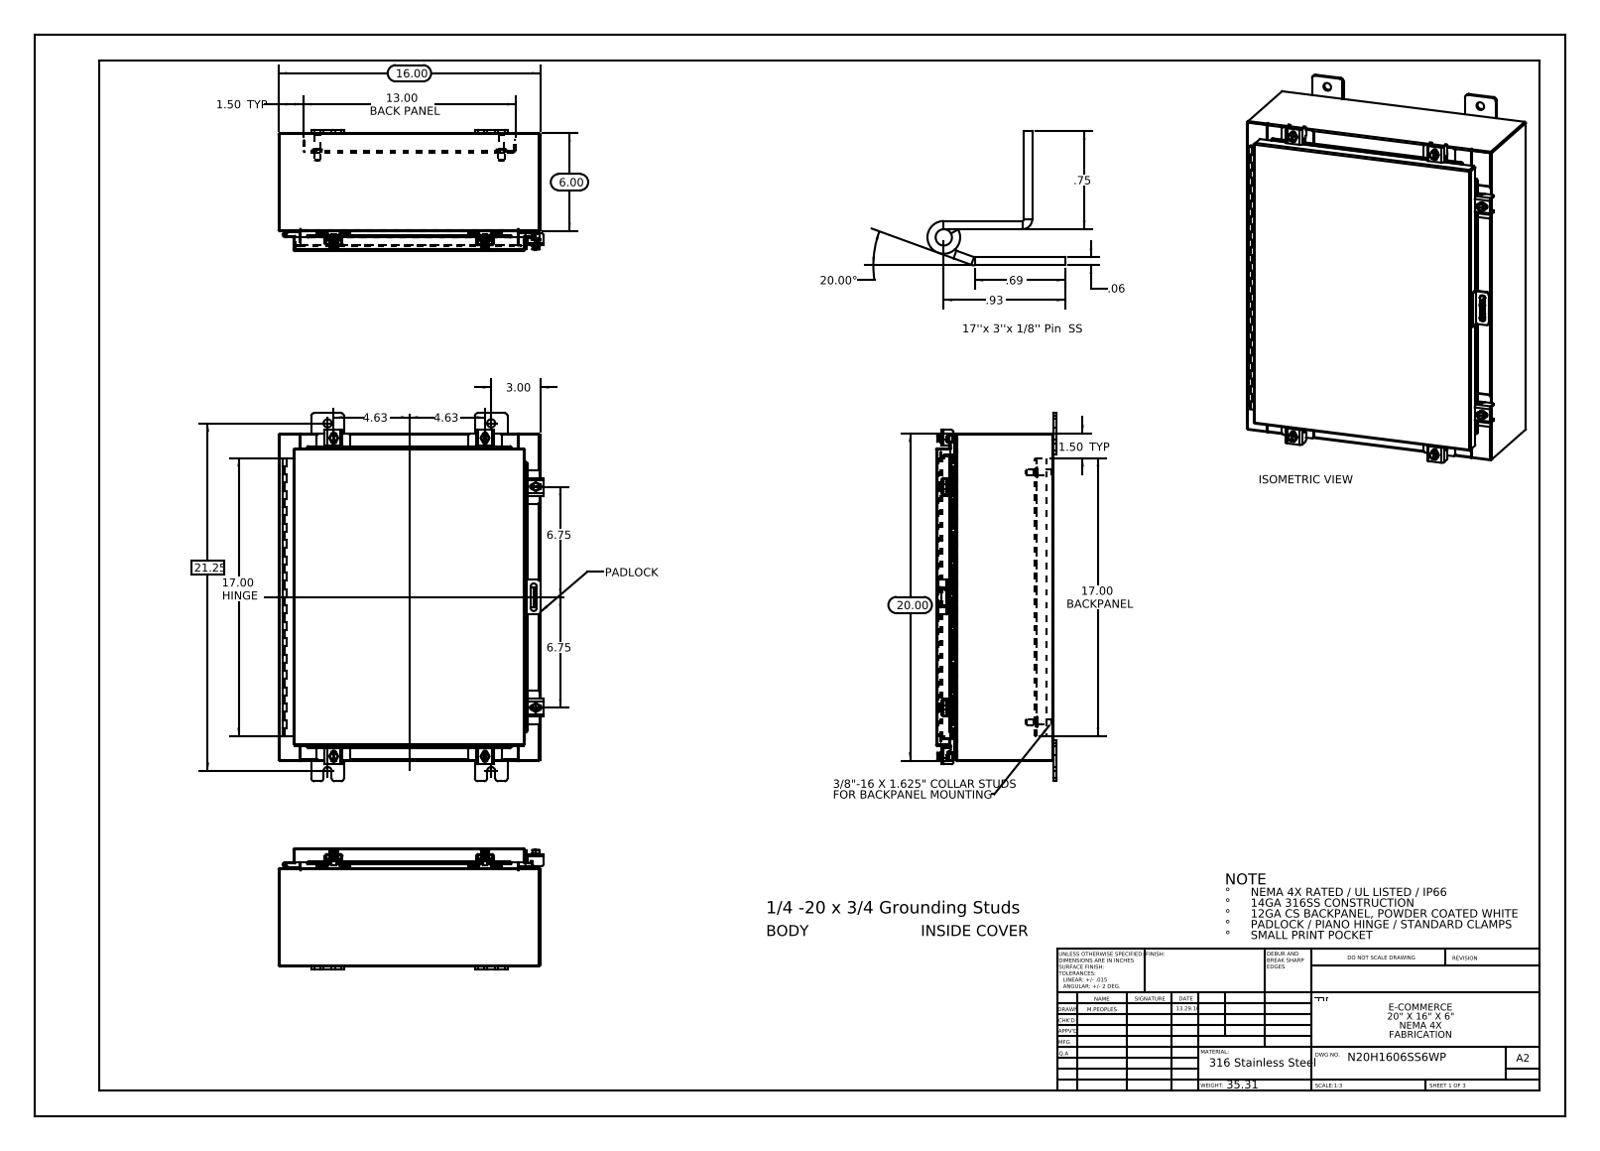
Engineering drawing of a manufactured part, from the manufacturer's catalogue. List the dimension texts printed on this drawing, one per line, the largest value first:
21.25
20.00
20.00°
17.00 HINGE
17.00 BACKPANEL
16.00
13.00 BACK PANEL
6.75
6.75
6.00
4.63
4.63
3.00
1.50 TYP
1.50 TYP
.93
.75
.69
.06
